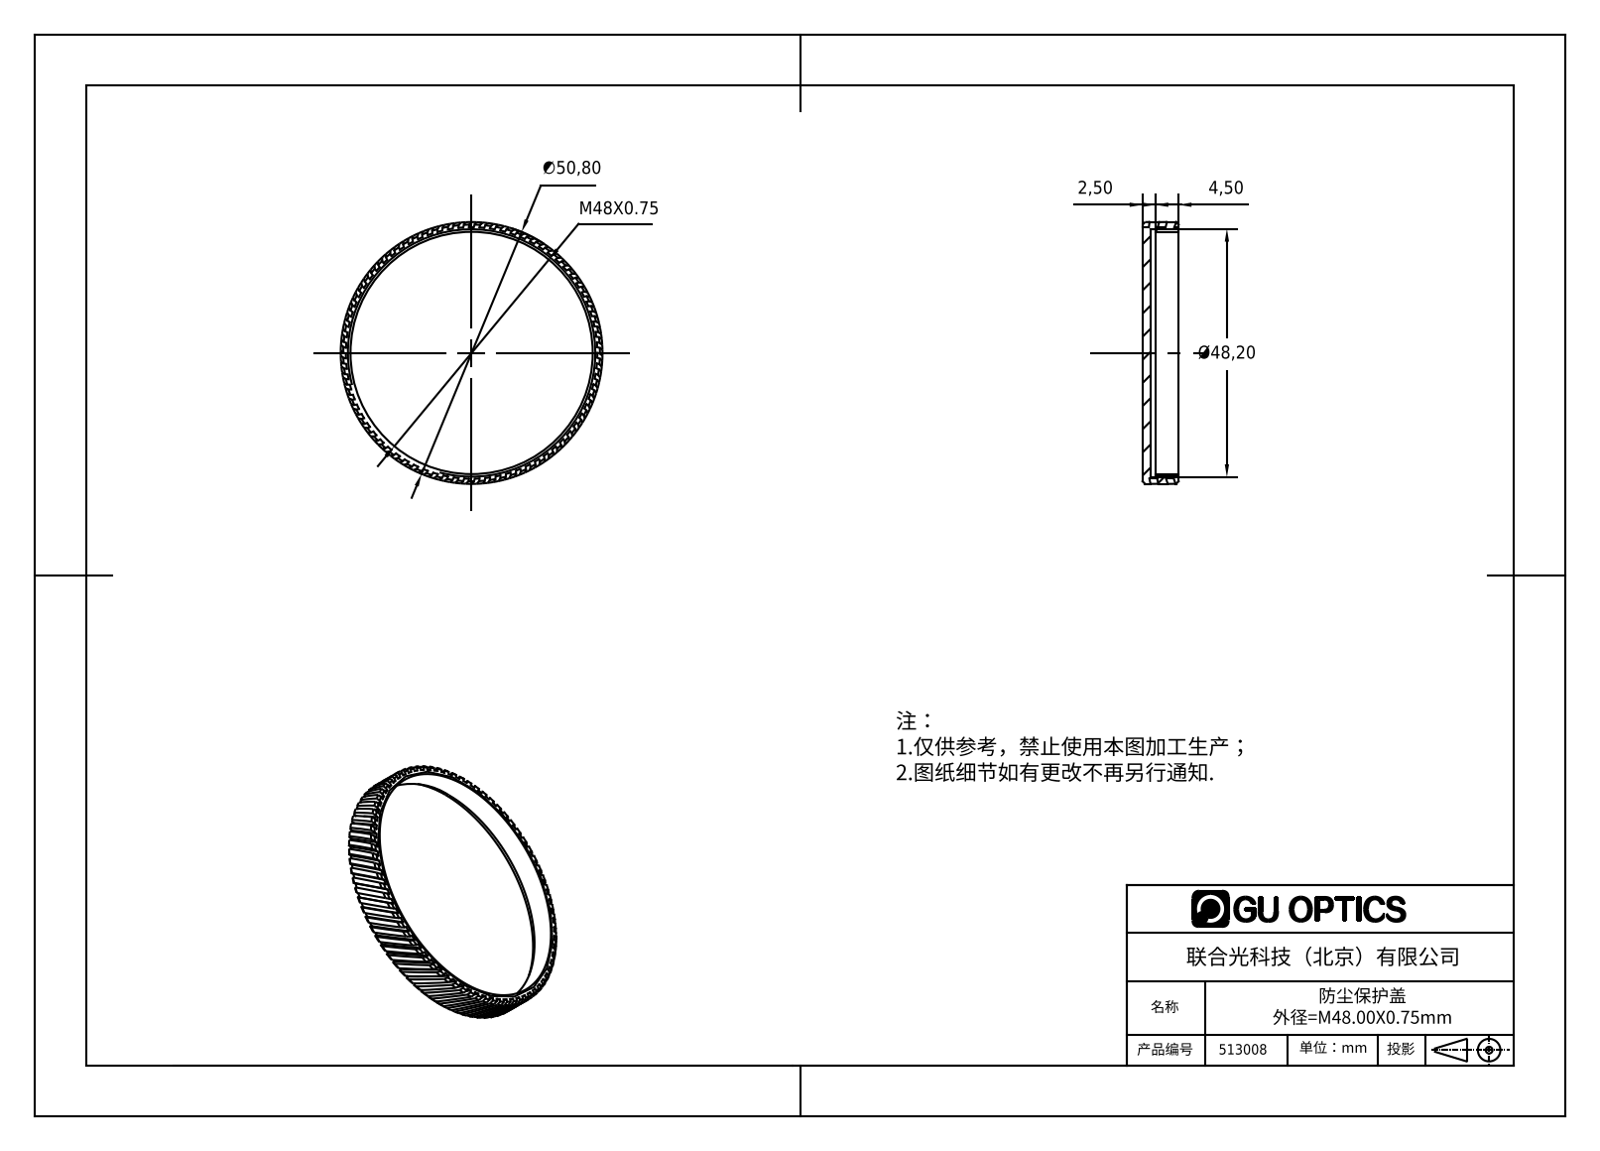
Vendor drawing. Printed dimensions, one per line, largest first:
∅50,80
Ø48,20
M48X0.75
4,50
2,50
